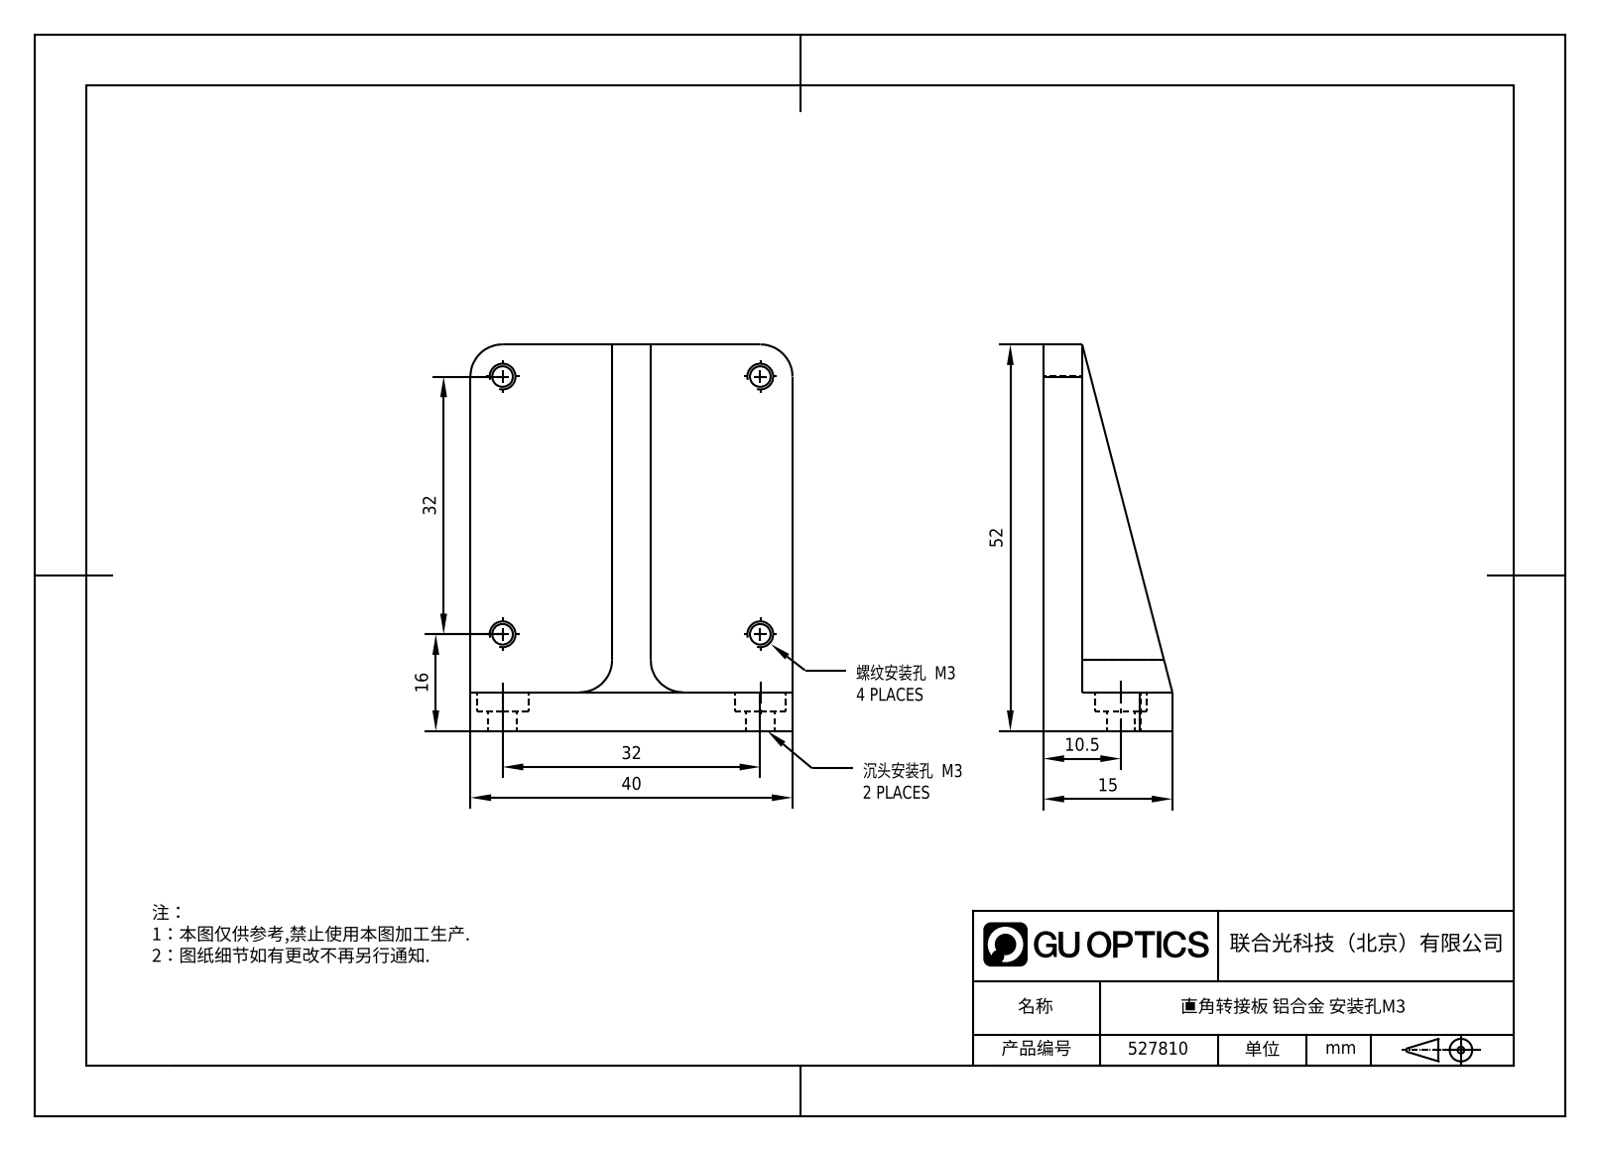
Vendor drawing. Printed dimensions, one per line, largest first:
52
40
32
32
16
15
10.5
